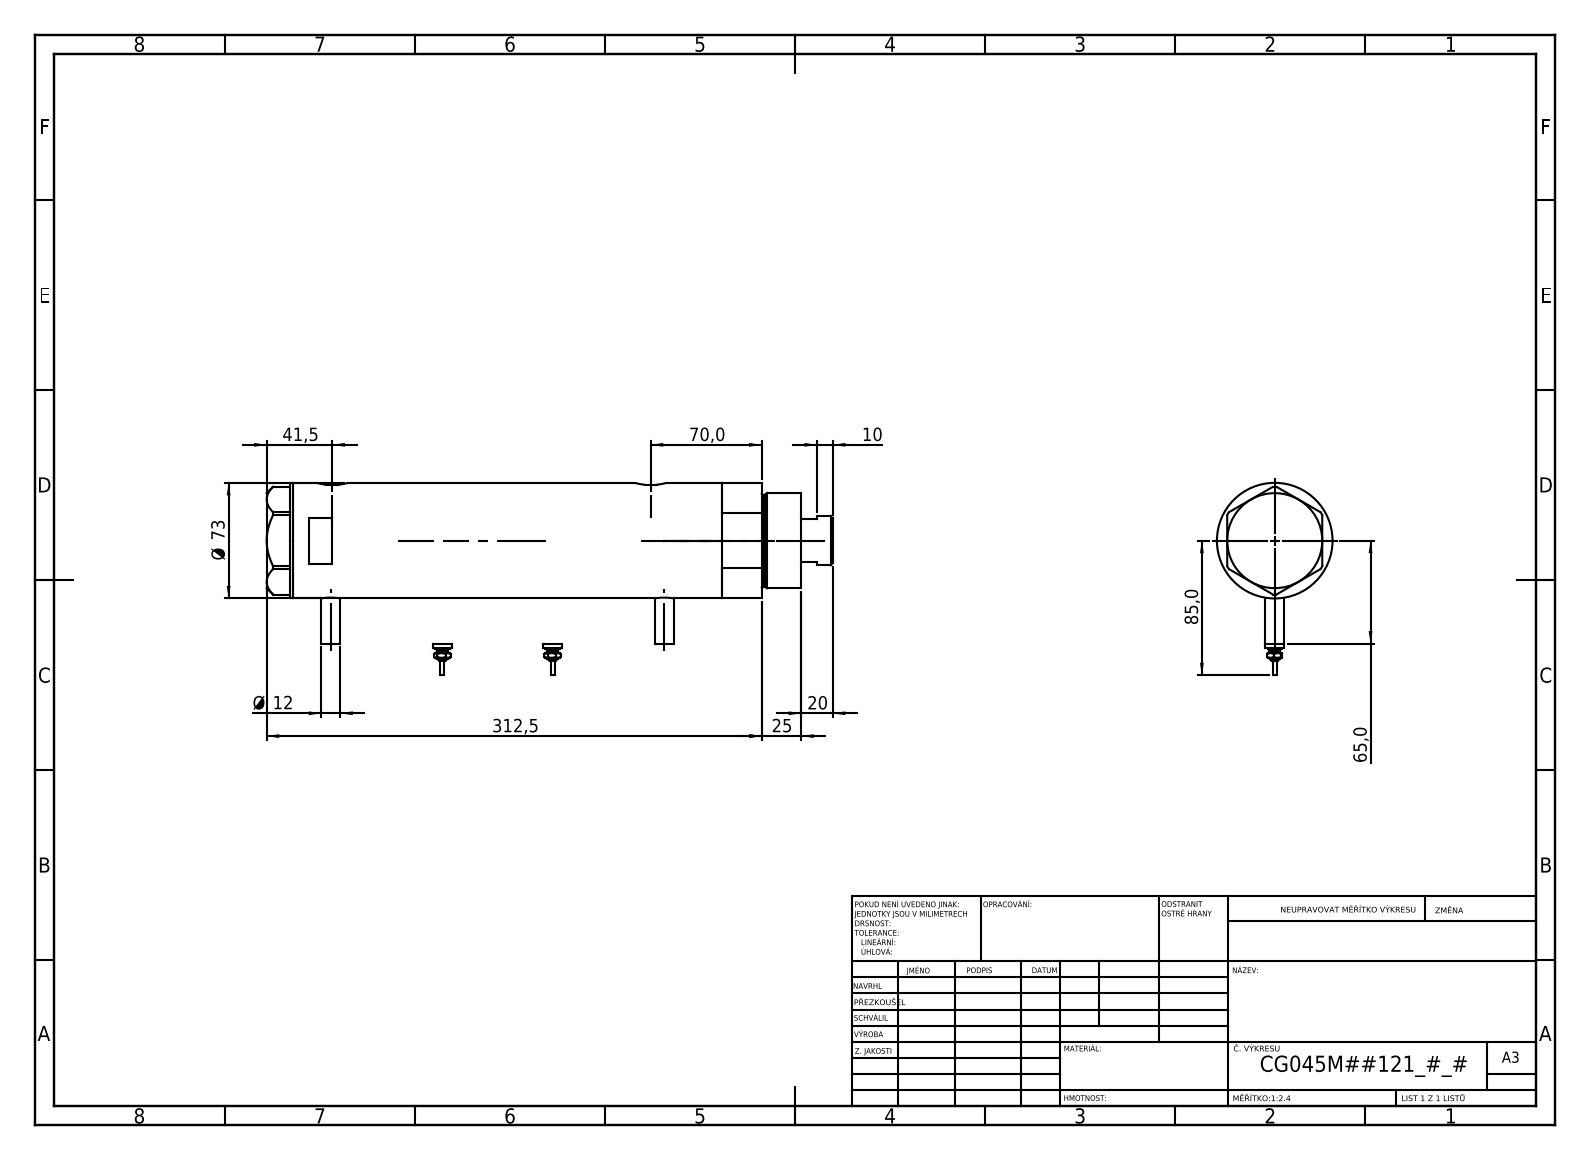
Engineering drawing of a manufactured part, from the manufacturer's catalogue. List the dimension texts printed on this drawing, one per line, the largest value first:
312,5
85,0
Ø 73
70,0
65,0
41,5
25
20
Ø 12
10
